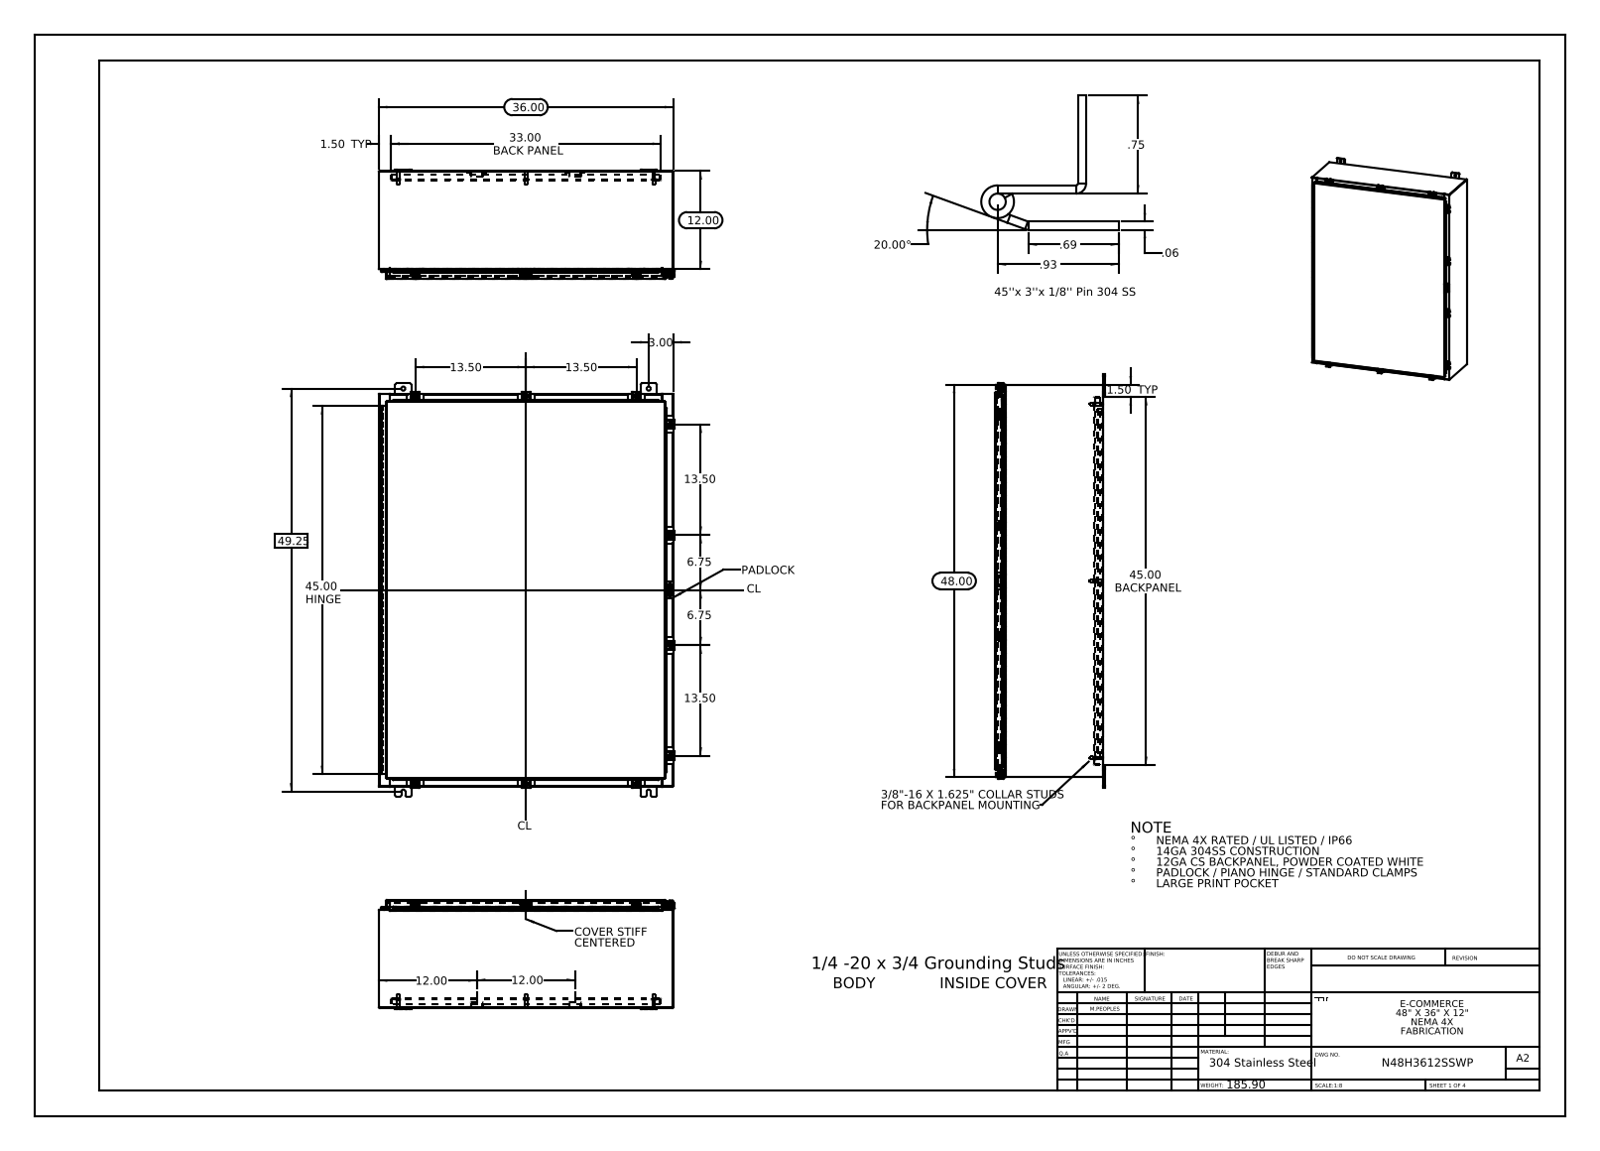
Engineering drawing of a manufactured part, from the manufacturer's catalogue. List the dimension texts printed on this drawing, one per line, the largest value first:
49.25
48.00
45.00 HINGE
45.00 BACKPANEL
36.00
33.00 BACK PANEL
20.00°
13.50
13.50
13.50
13.50
12.00
12.00
12.00
6.75
6.75
3.00
1.50 TYP
1.50 TYP
.93
.75
.69
.06
